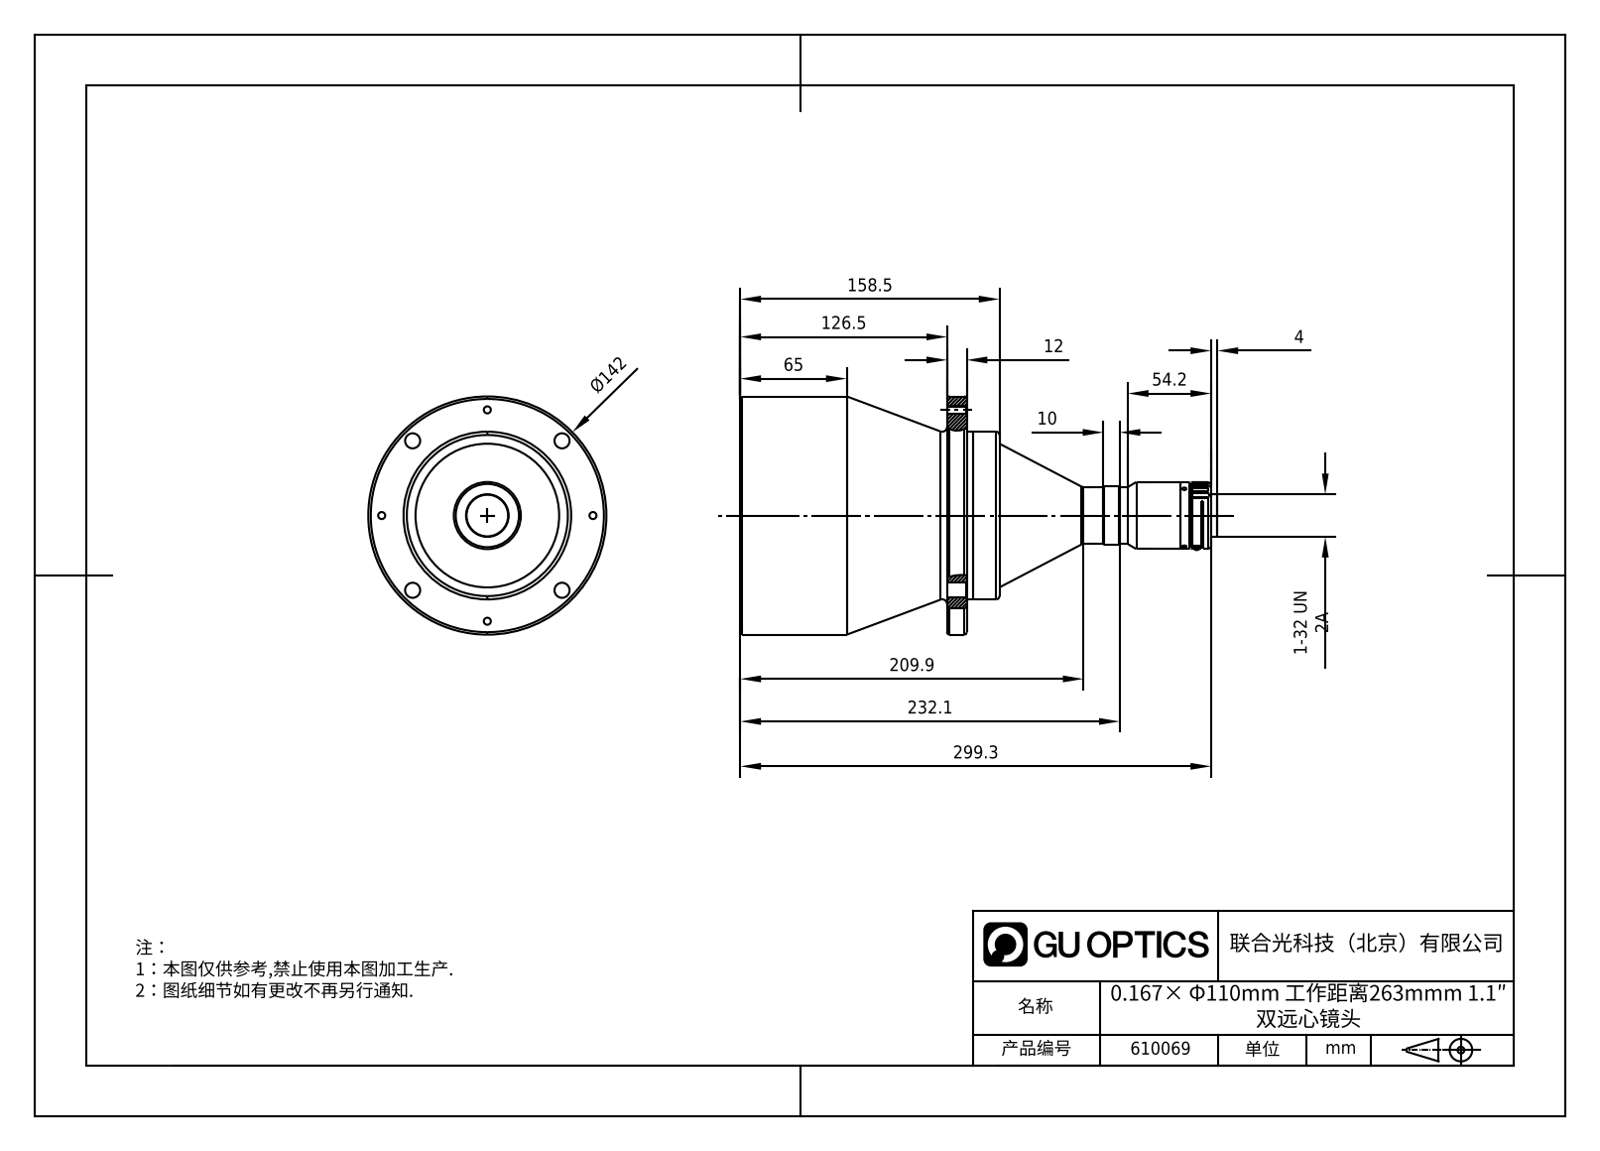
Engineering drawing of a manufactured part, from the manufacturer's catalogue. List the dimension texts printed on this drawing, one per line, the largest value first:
299.3
232.1
209.9
158.5
Ø142
126.5
65
54.2
12
10
4
1-32 UN 2A
